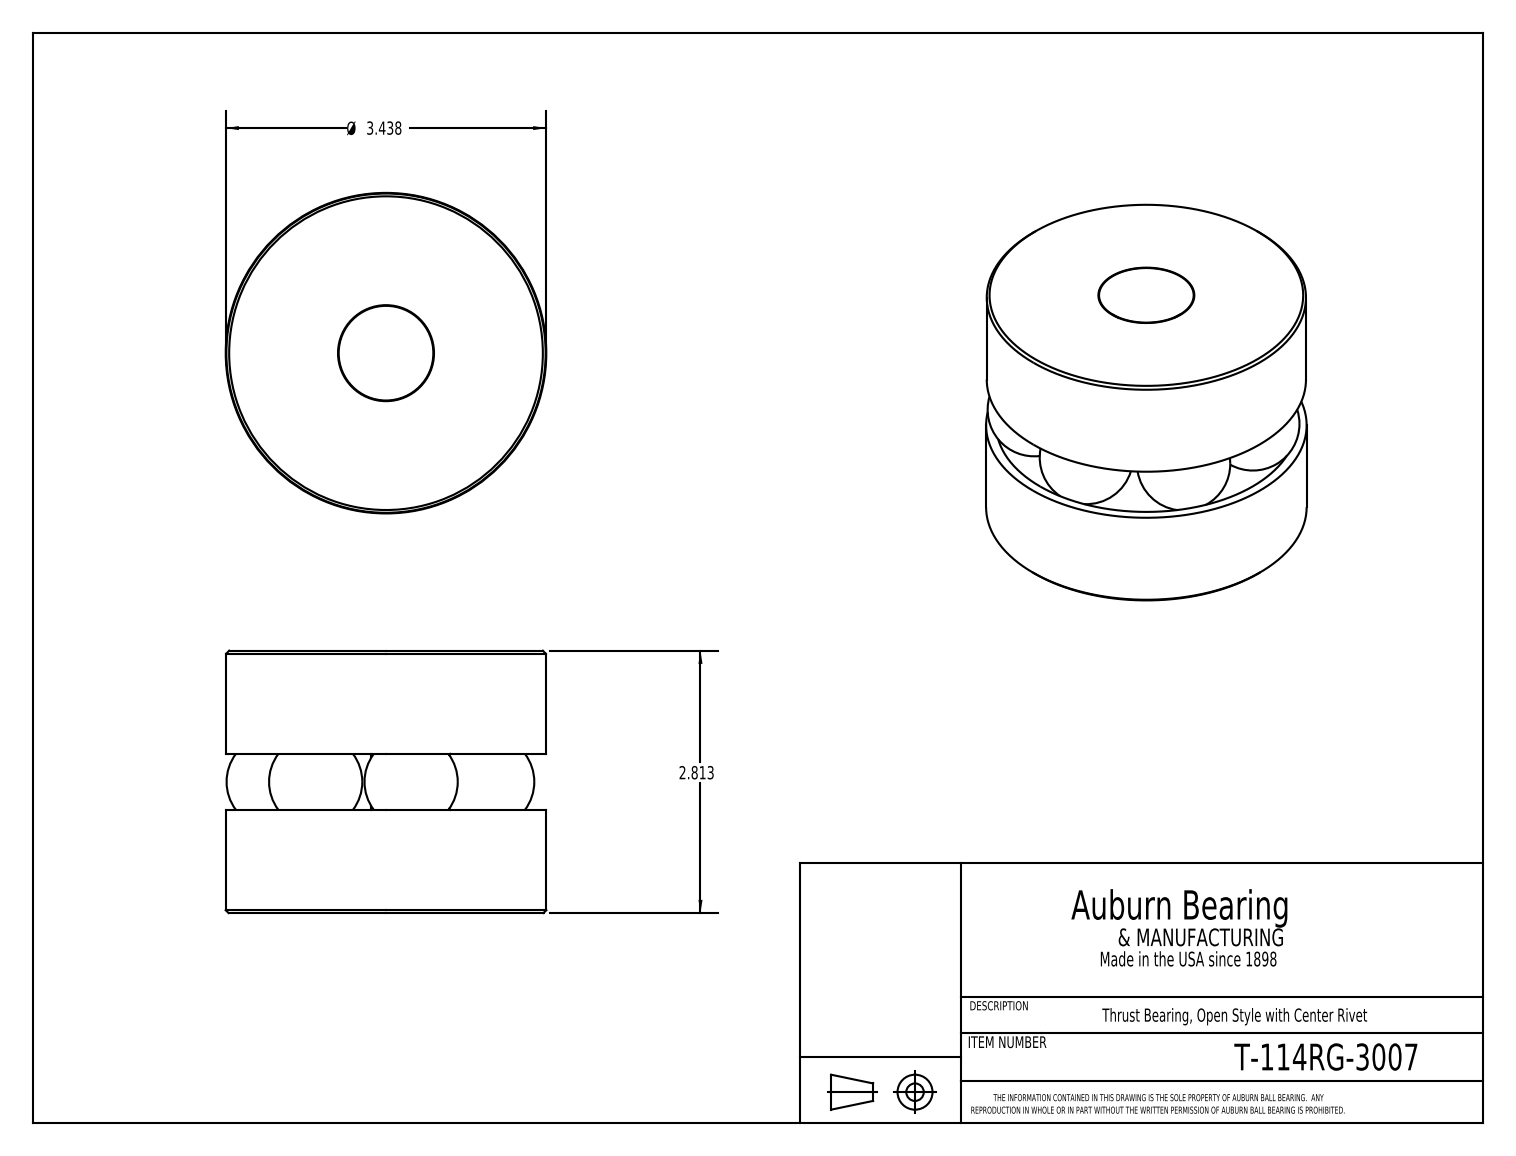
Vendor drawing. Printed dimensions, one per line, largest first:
Ø 3.438
2.813
